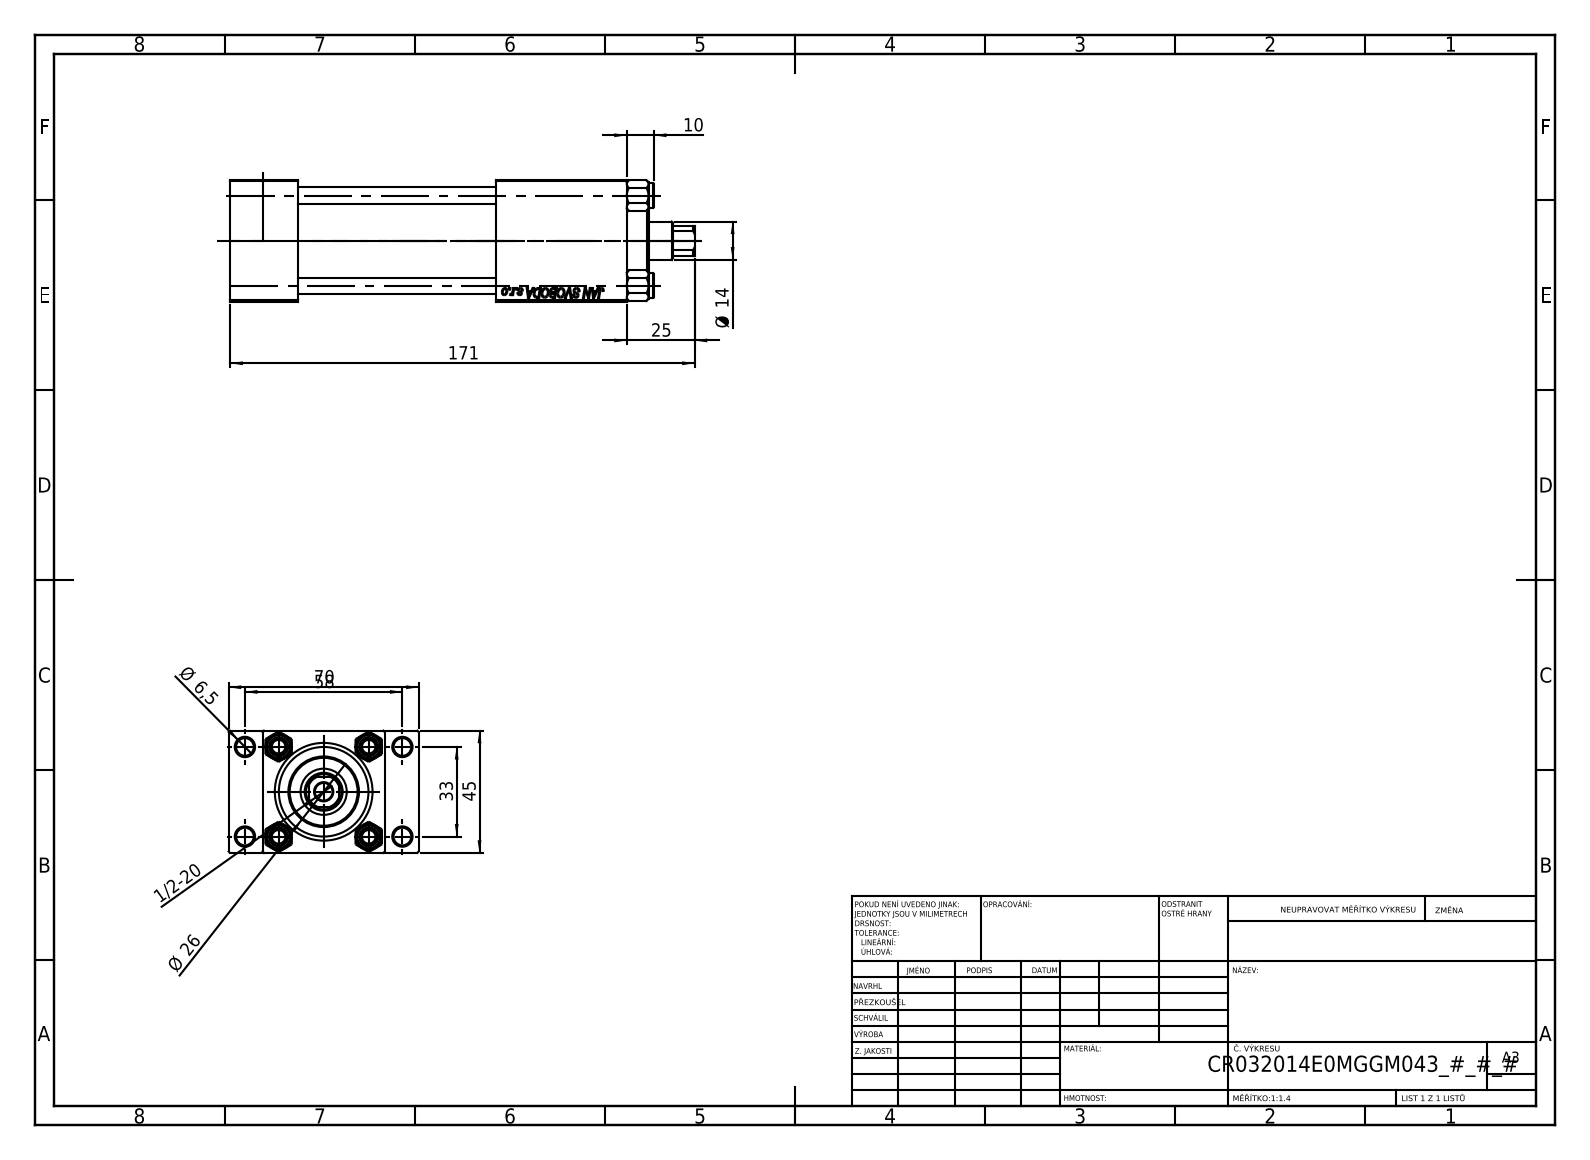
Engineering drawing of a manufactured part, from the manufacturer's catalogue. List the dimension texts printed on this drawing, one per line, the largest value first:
171
70
58
45
33
Ø 26
25
Ø 14
10
Ø 6,5
1/2-20
